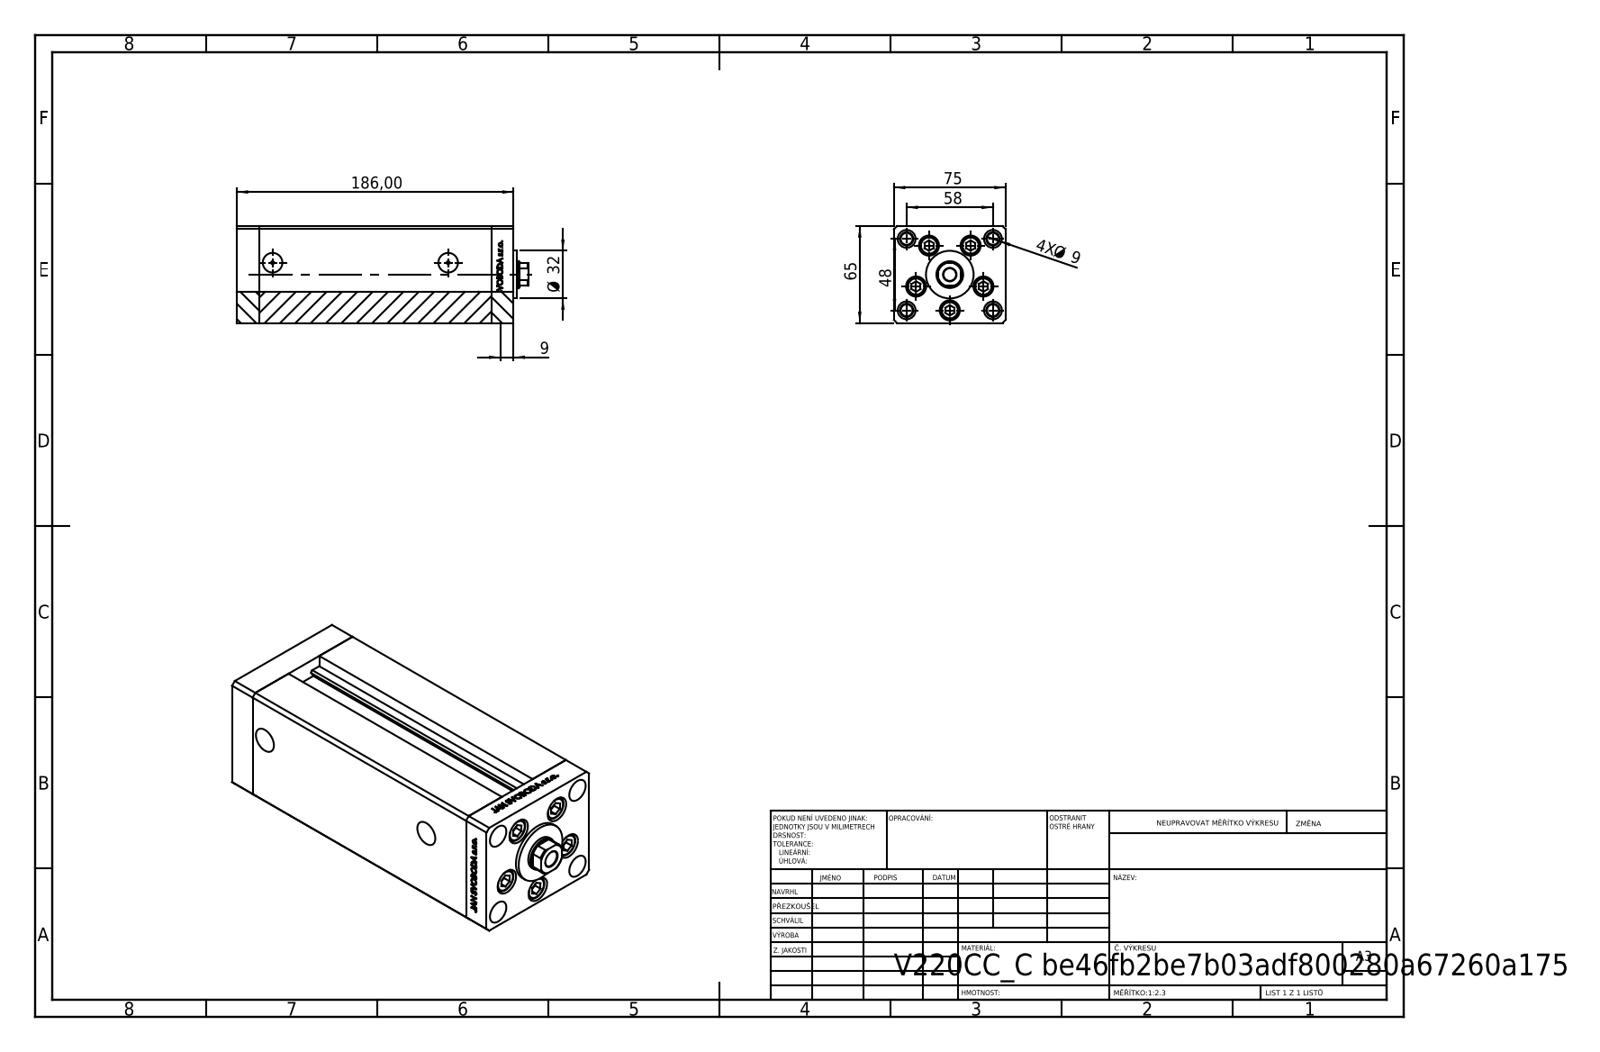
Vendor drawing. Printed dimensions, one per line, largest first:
186,00
75
65
58
48
Ø 32
9
4X Ø 9
